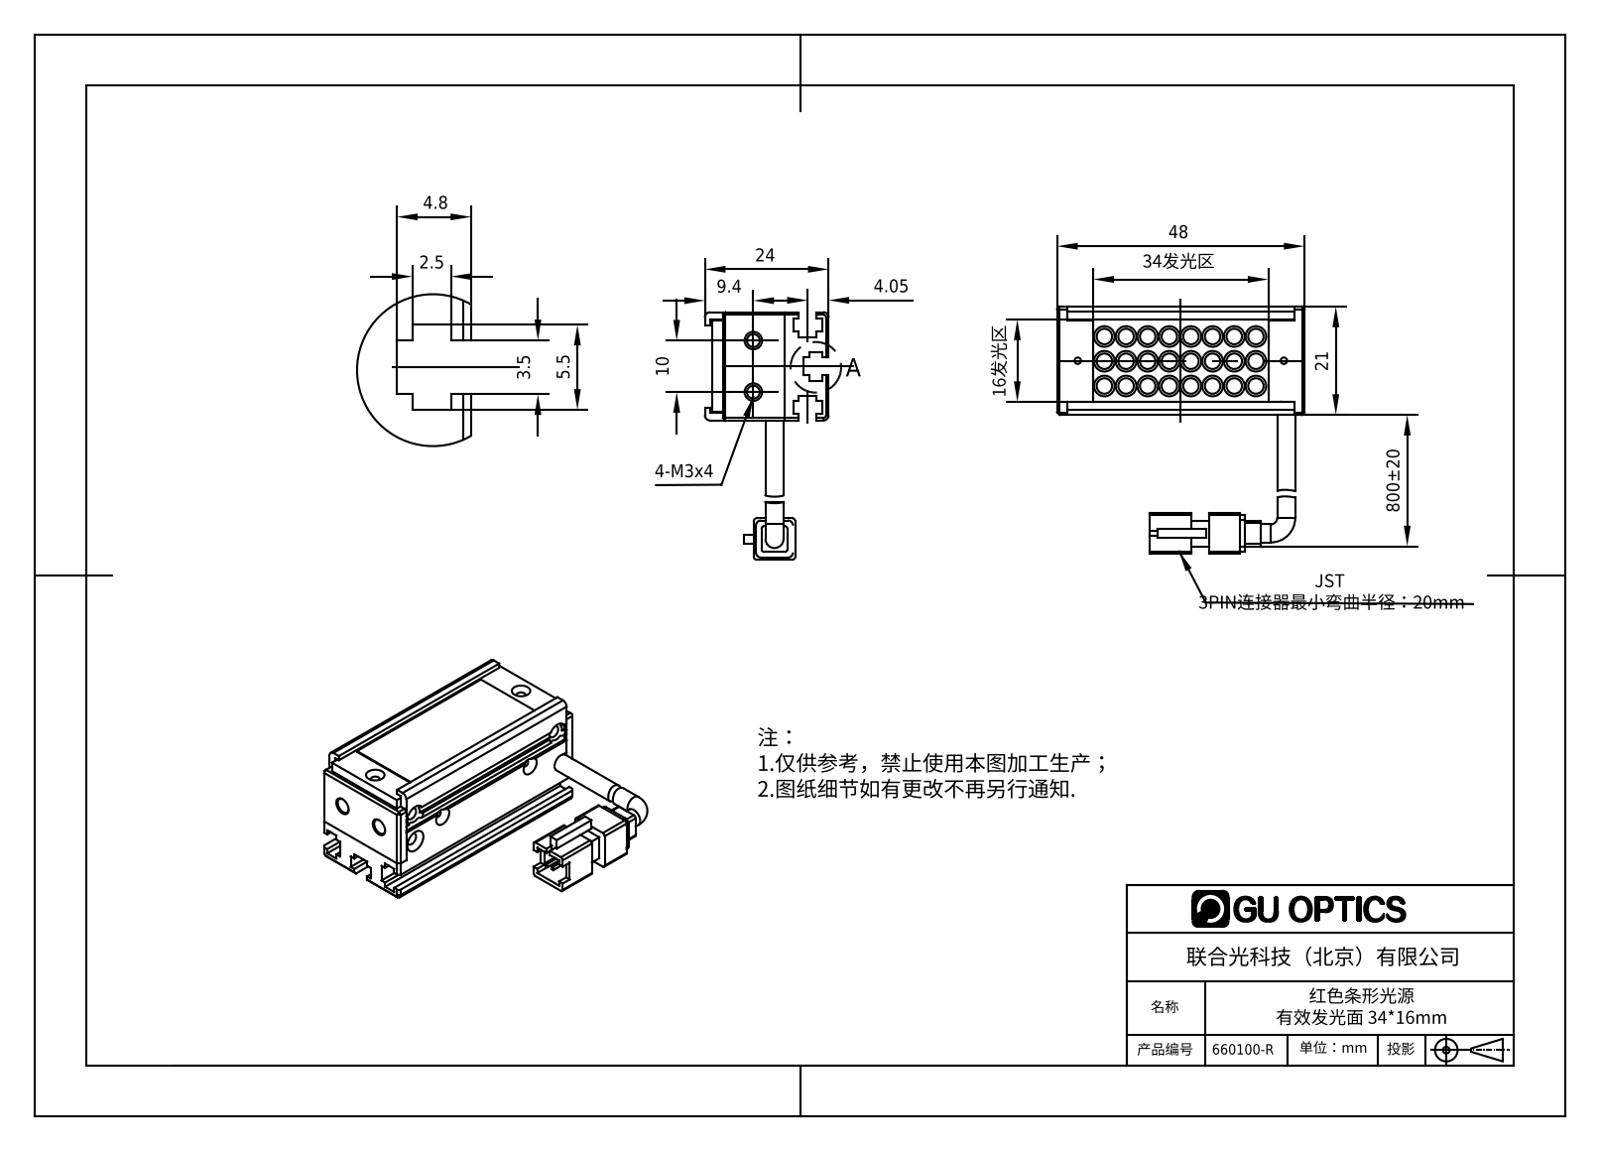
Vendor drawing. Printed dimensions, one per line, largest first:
800±20
48
34发光区
24
21
16发光区
10
9.4
5.5
4.8
4.05
3.5
2.5
